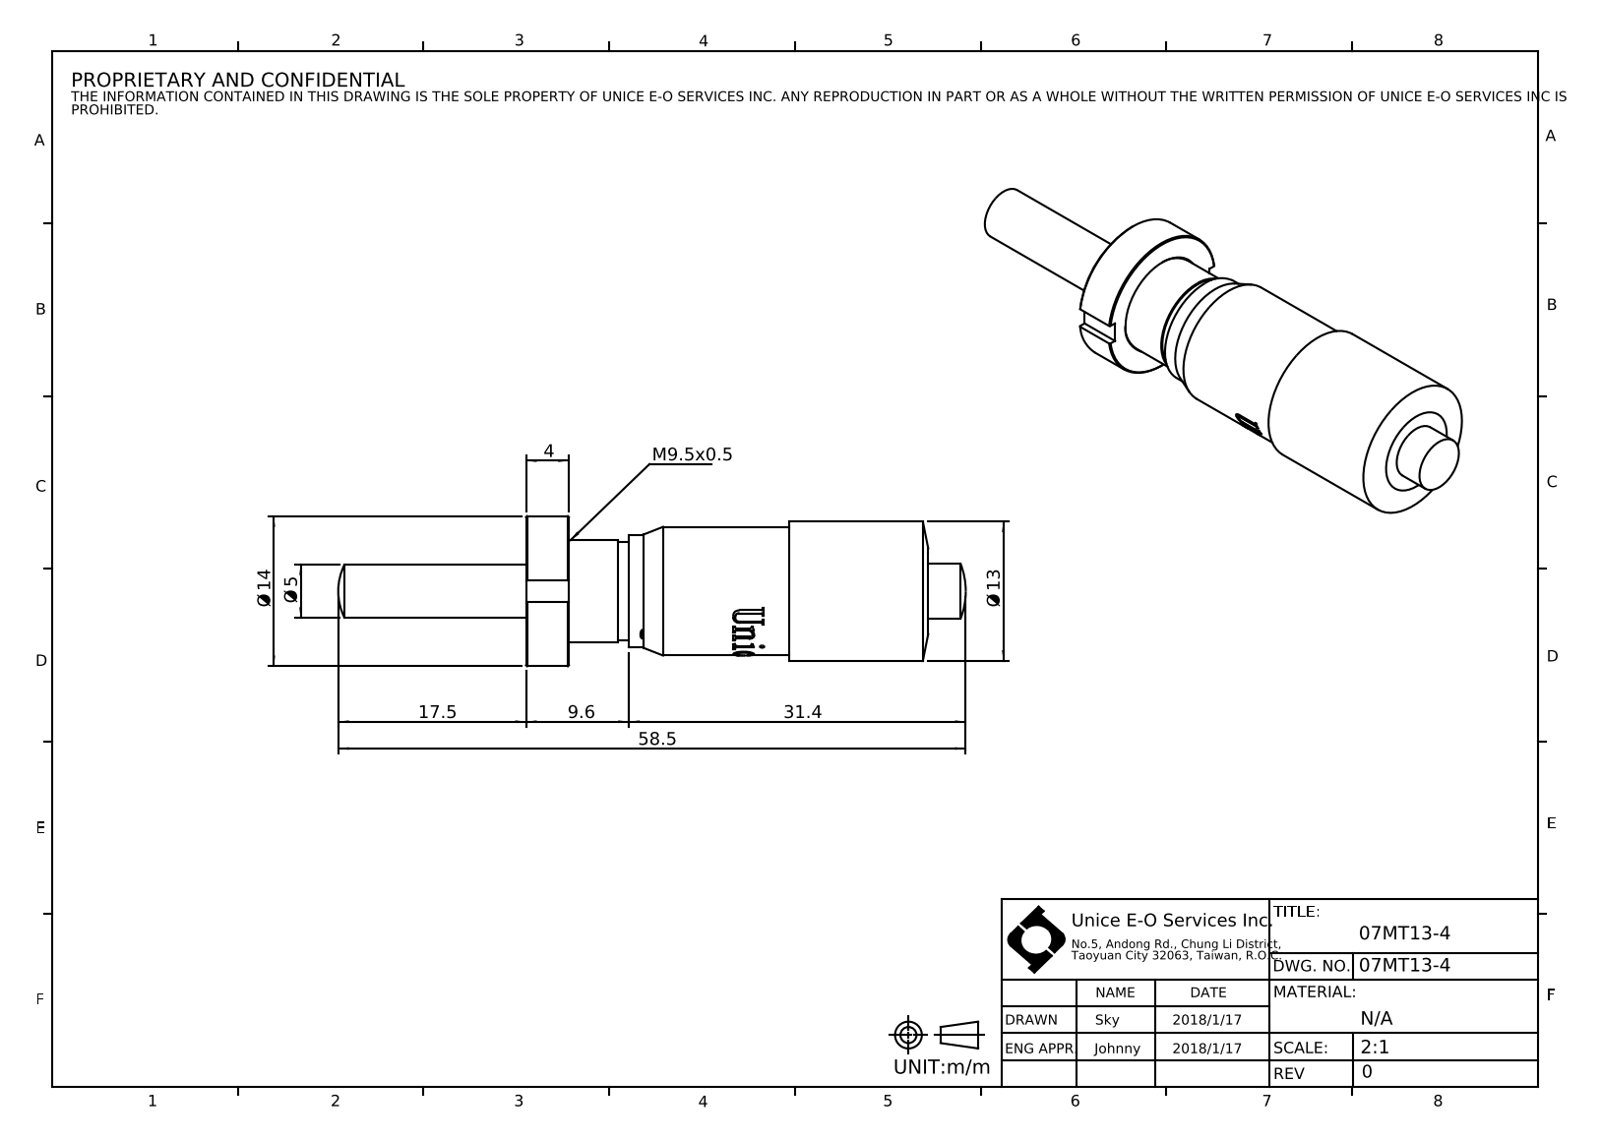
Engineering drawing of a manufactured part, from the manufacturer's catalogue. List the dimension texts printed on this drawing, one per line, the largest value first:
58.5
31.4
17.5
Ø 14
Ø 13
9.6
Ø 5
4
